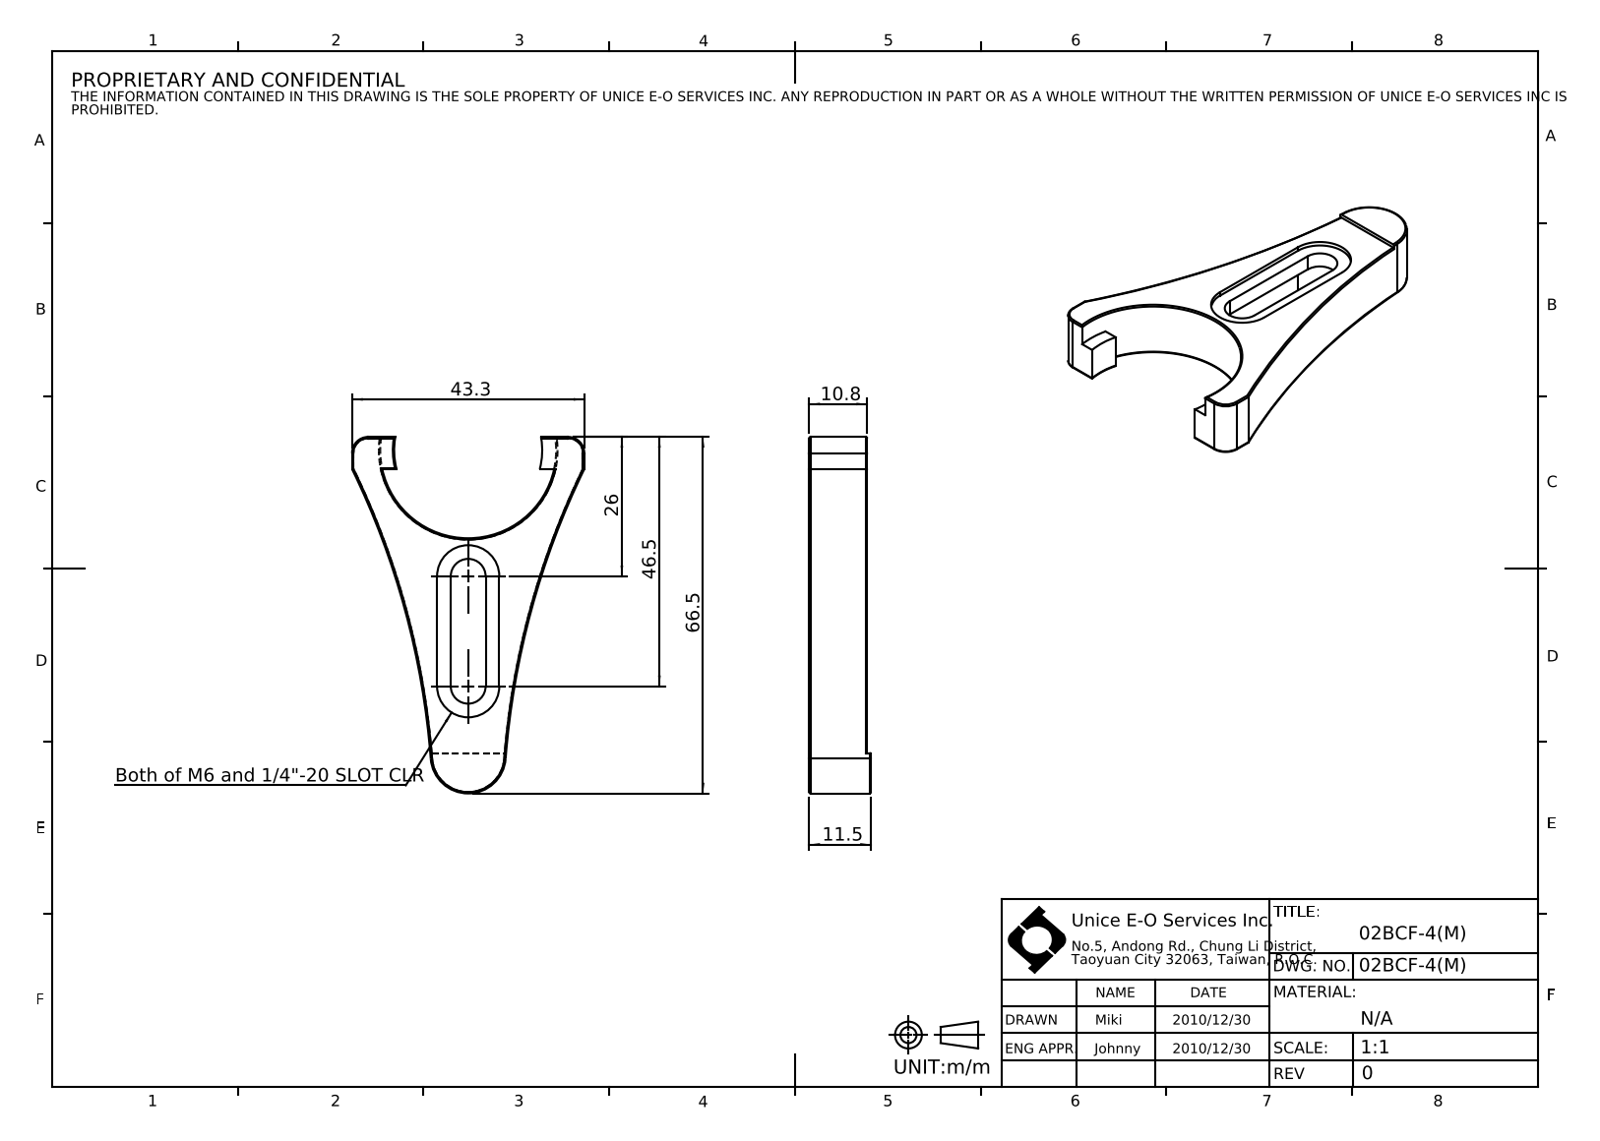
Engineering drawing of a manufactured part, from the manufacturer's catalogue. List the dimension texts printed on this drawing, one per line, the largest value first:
66.5
46.5
43.3
26
11.5
10.8
Both of M6 and 1/4"-20 SLOT CLR
